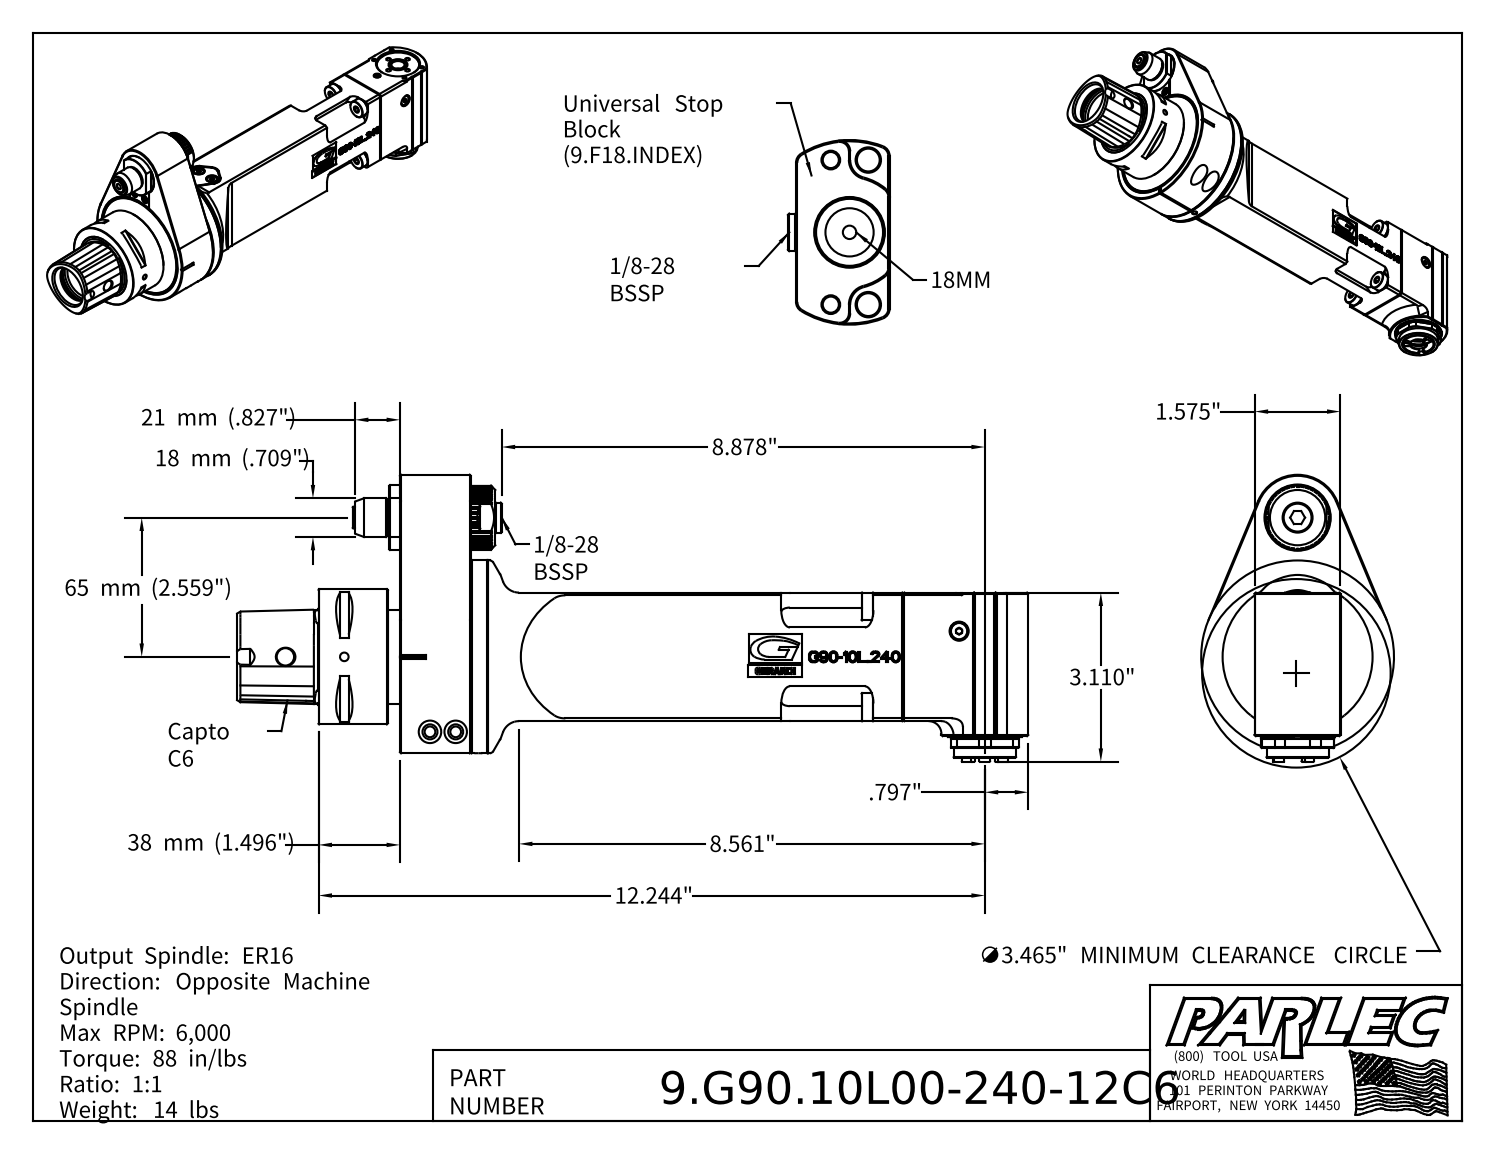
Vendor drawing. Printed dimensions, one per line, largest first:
65 mm (2.559")
38 mm (1.496")
21 mm (.827")
18 mm (.709")
12.244"
8.878"
8.561"
∅3.465" MINIMUM CLEARANCE CIRCLE
3.110"
1.575"
.797"
